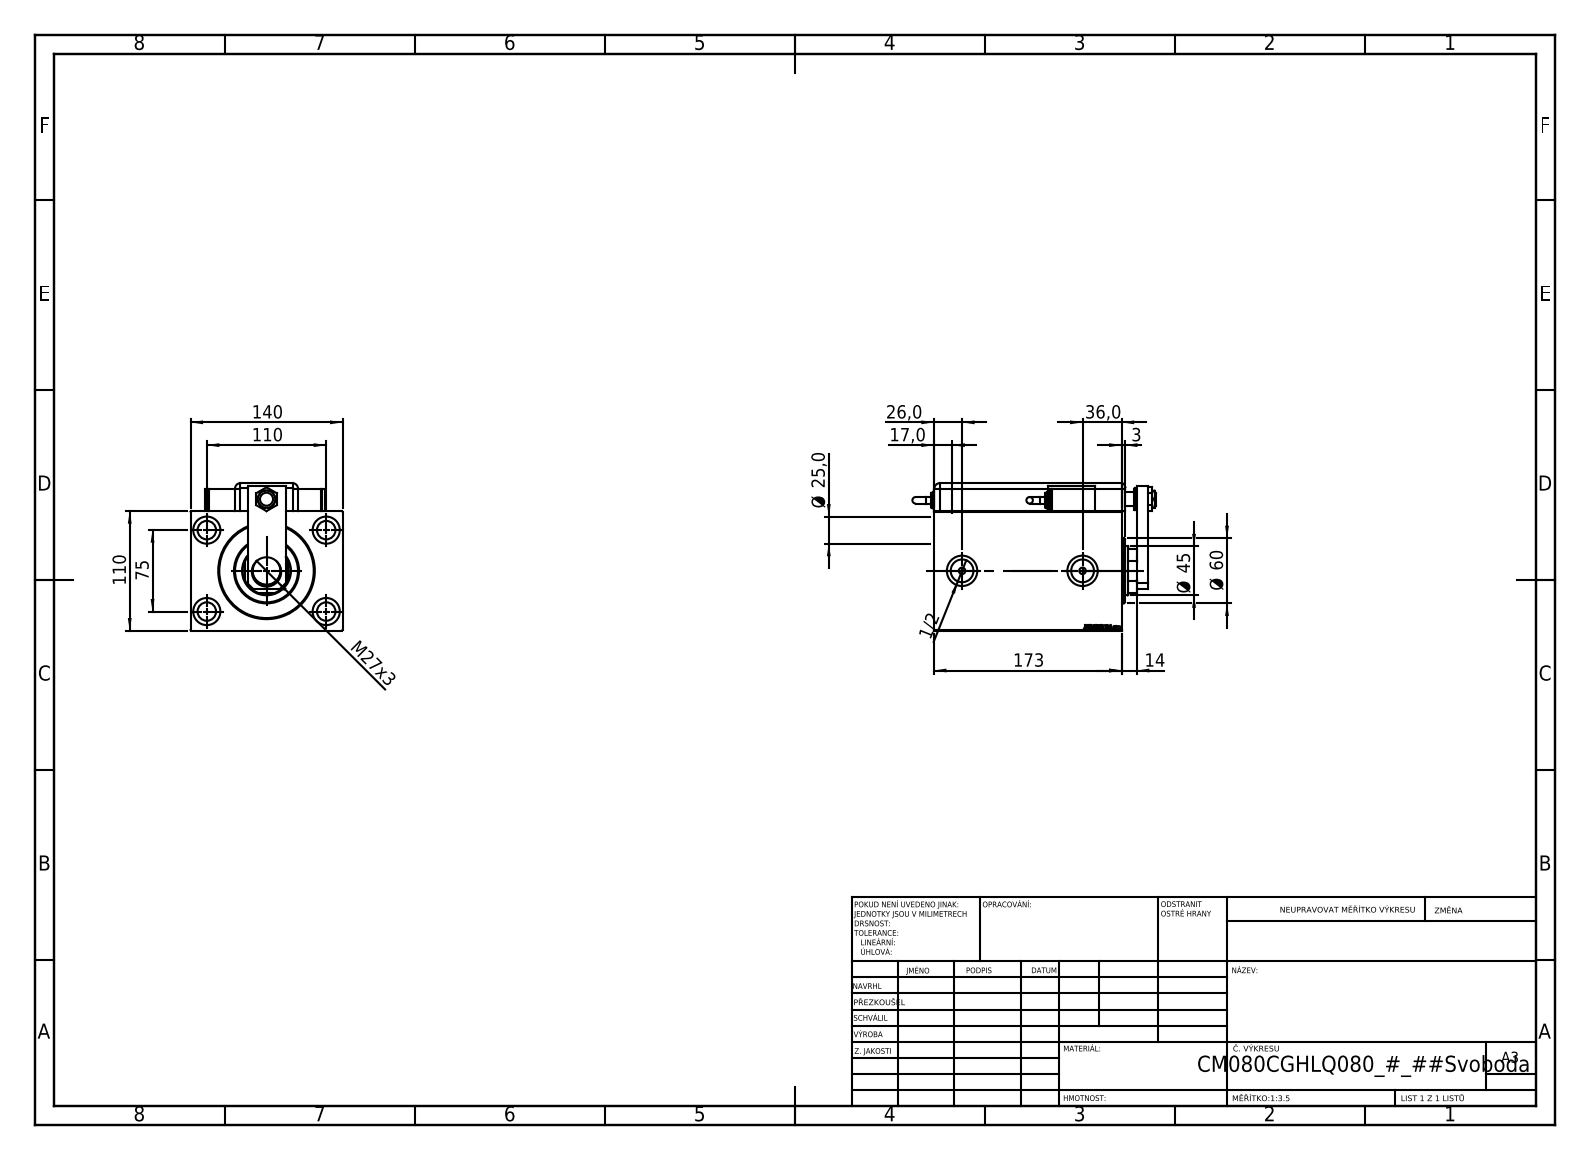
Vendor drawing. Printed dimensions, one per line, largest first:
173
140
110
110
75
Ø 60
Ø 45
36,0
M27x3
26,0
Ø 25,0
17,0
14
3
1/2
